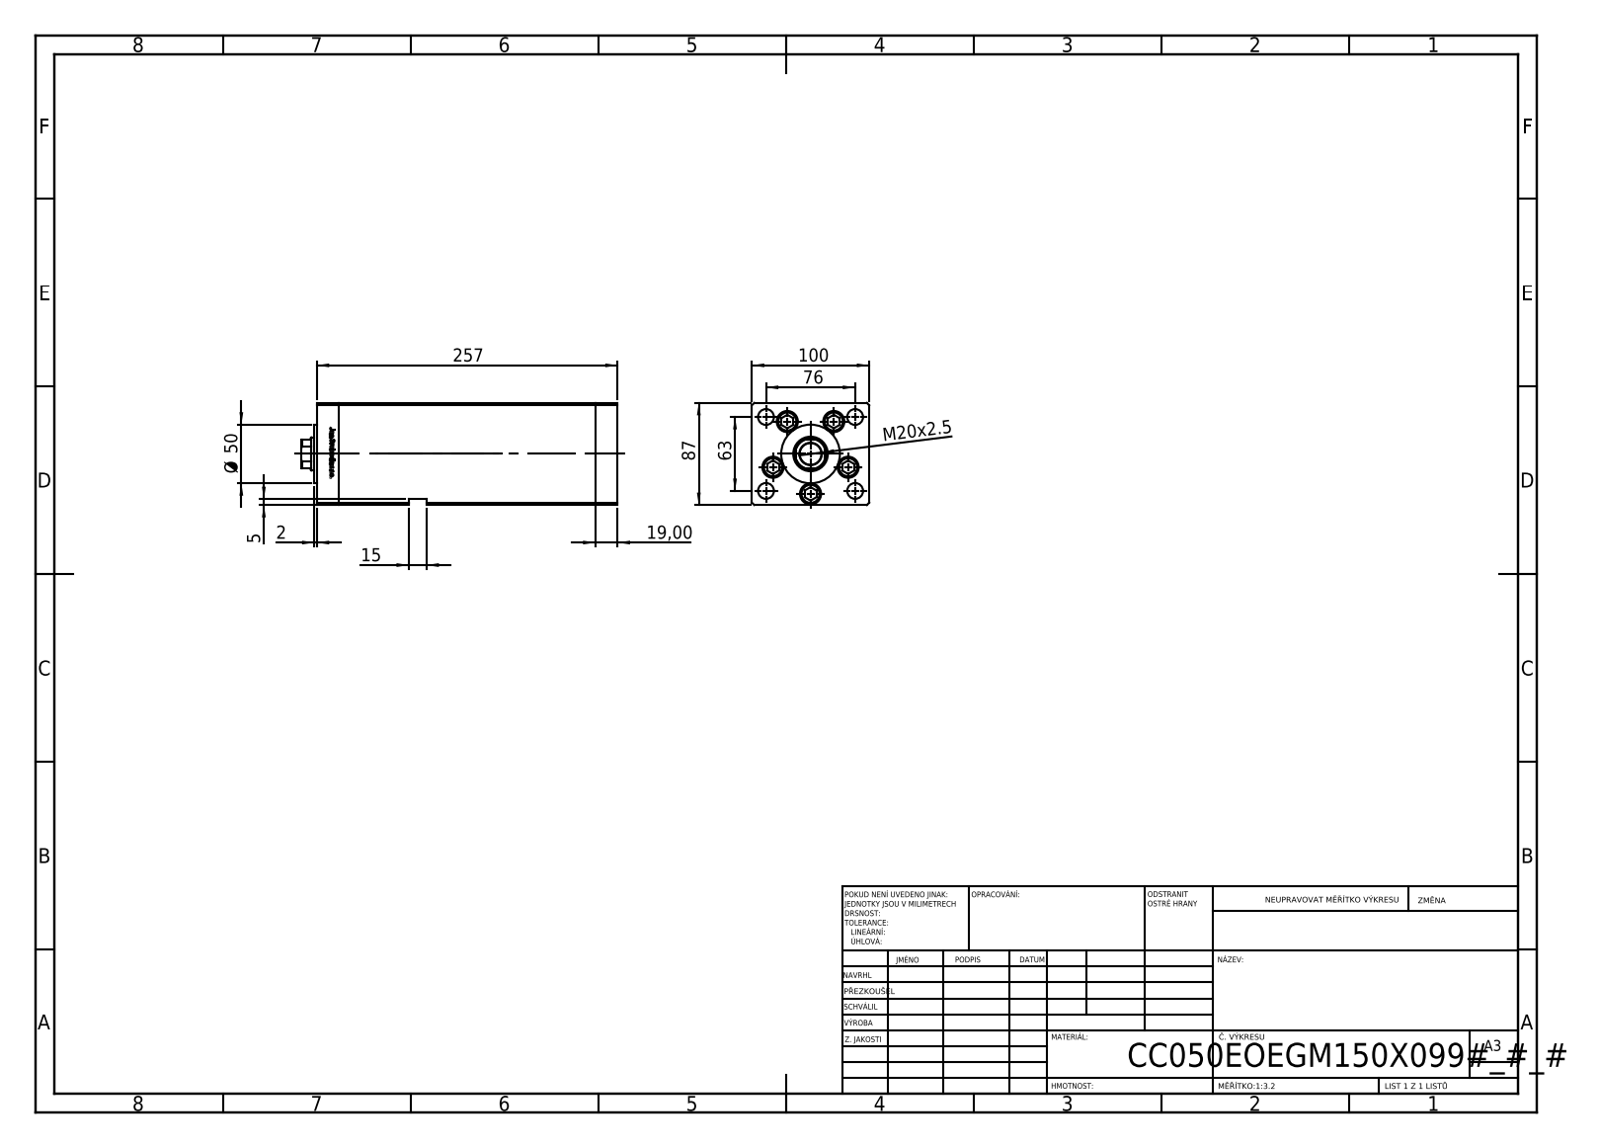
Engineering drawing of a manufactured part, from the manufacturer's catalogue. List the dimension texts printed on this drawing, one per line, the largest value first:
257
100
87
76
63
Ø 50
M20x2.5
19,00
15
5
2
